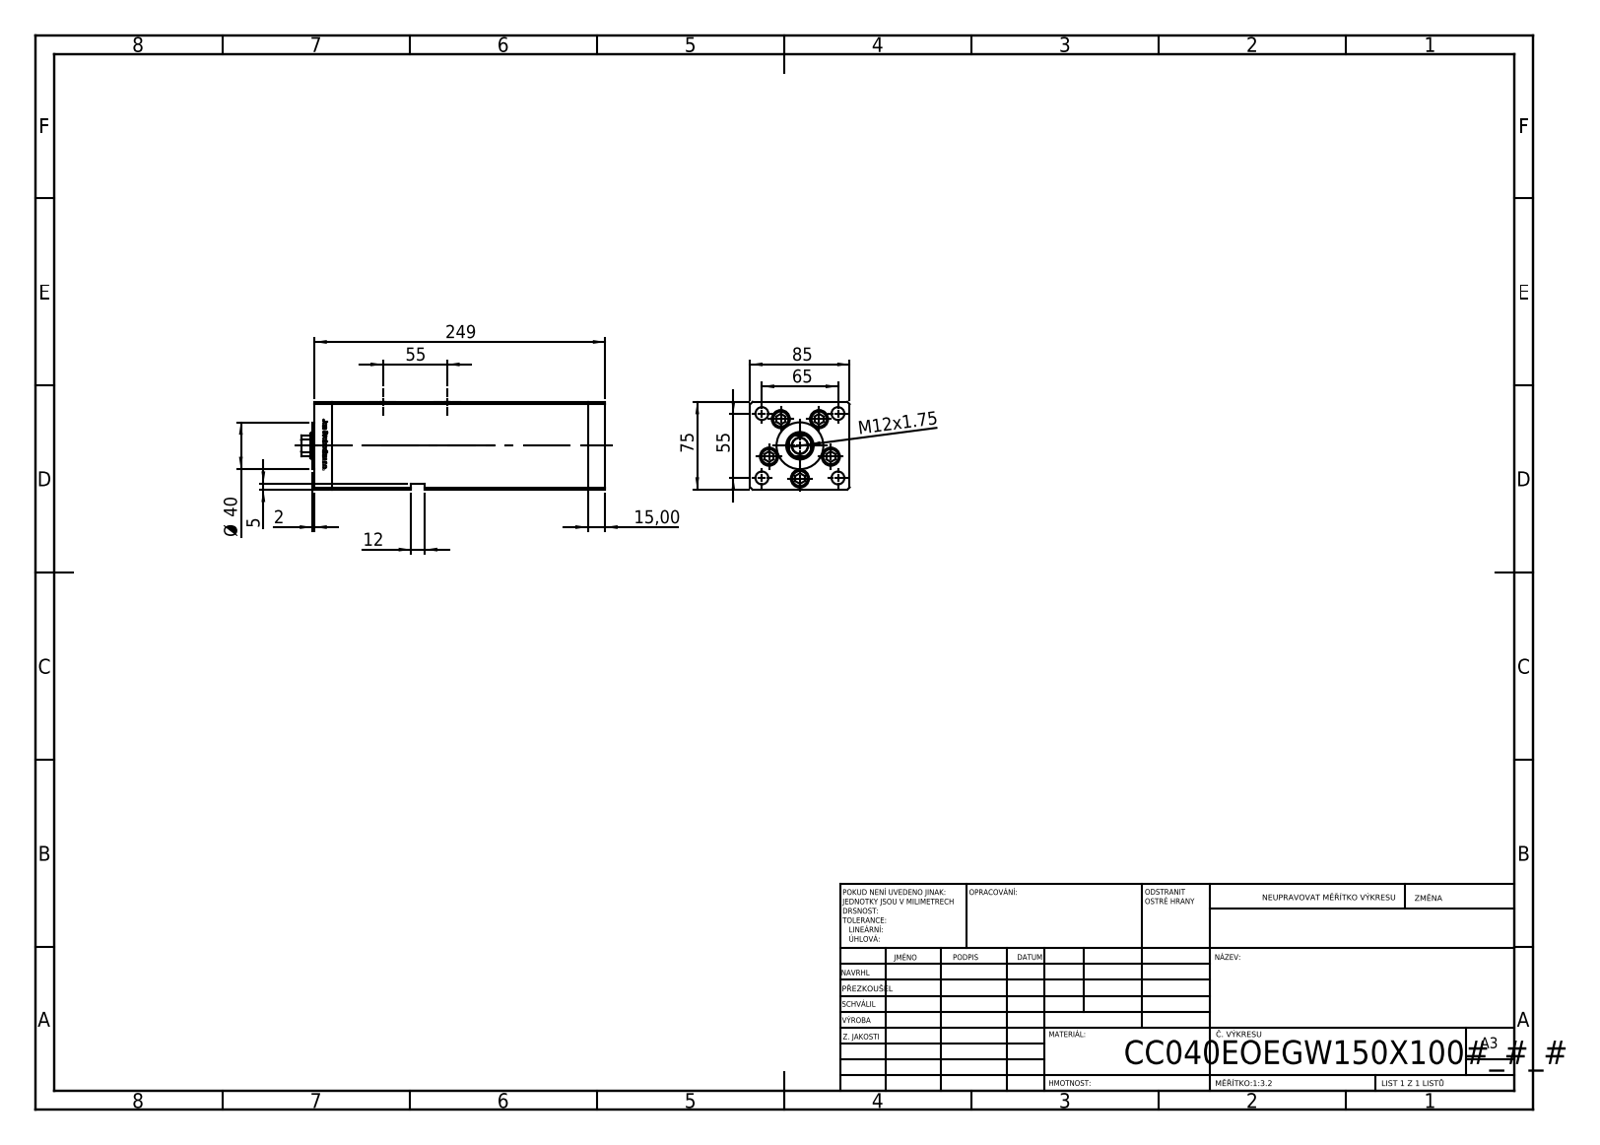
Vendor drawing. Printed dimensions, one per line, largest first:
249
85
75
65
55
55
Ø 40
15,00
12
M12x1.75
5
2
